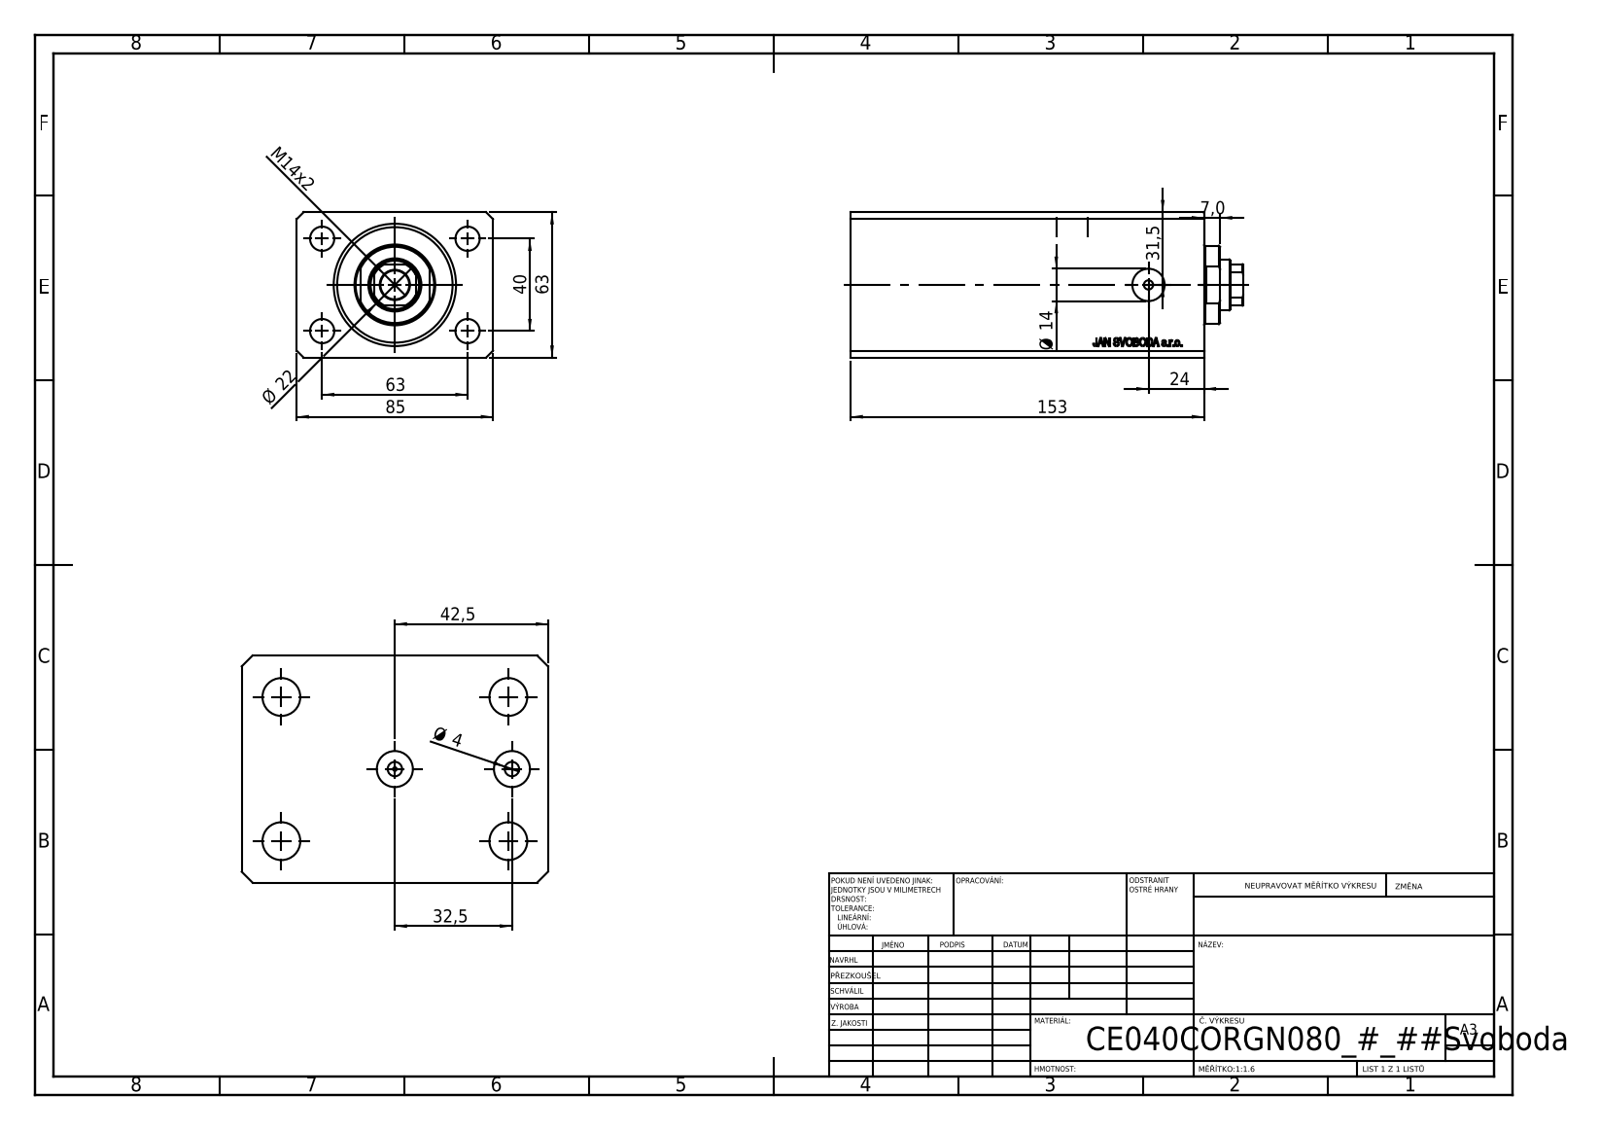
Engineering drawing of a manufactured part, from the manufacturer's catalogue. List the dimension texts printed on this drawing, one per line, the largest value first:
153
85
63
63
42,5
40
32,5
31,5
24
Ø 22
M14x2
Ø 14
7,0
Ø 4
